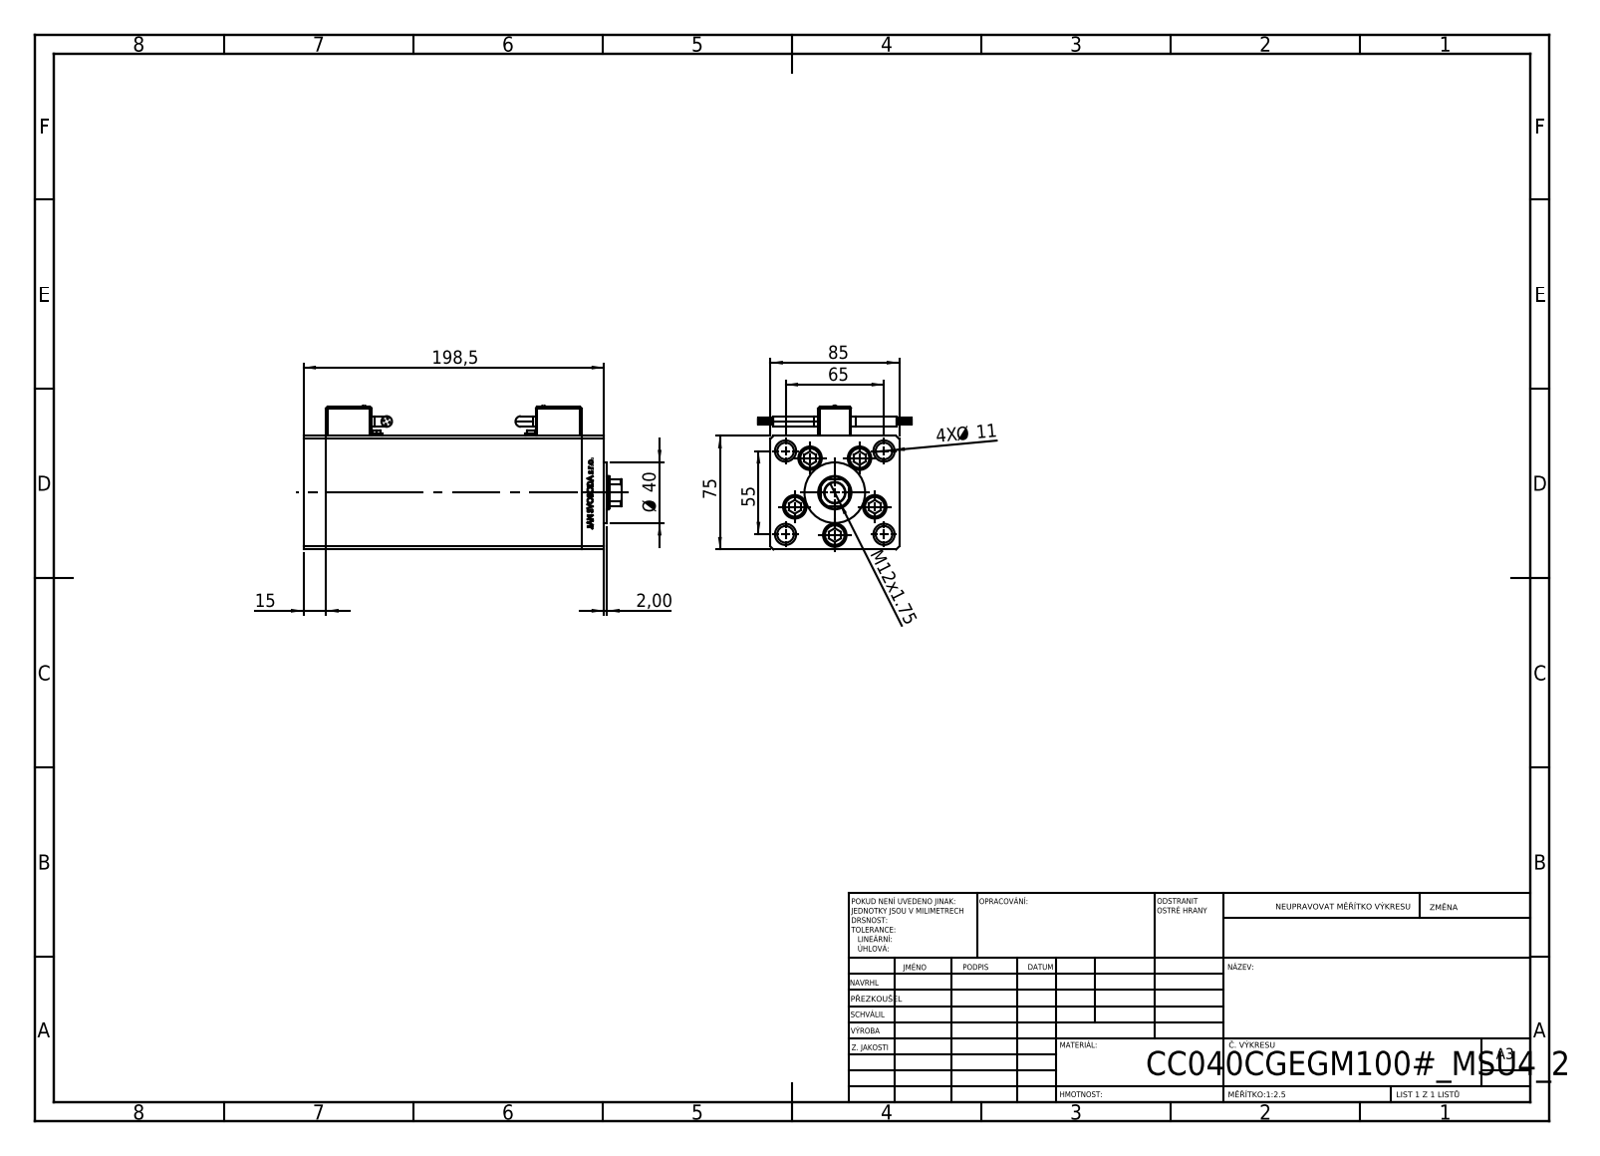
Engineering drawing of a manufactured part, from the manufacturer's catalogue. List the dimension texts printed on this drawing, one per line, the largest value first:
198,5
85
75
65
55
Ø 40
15
M12x1.75
4X Ø 11
2,00
